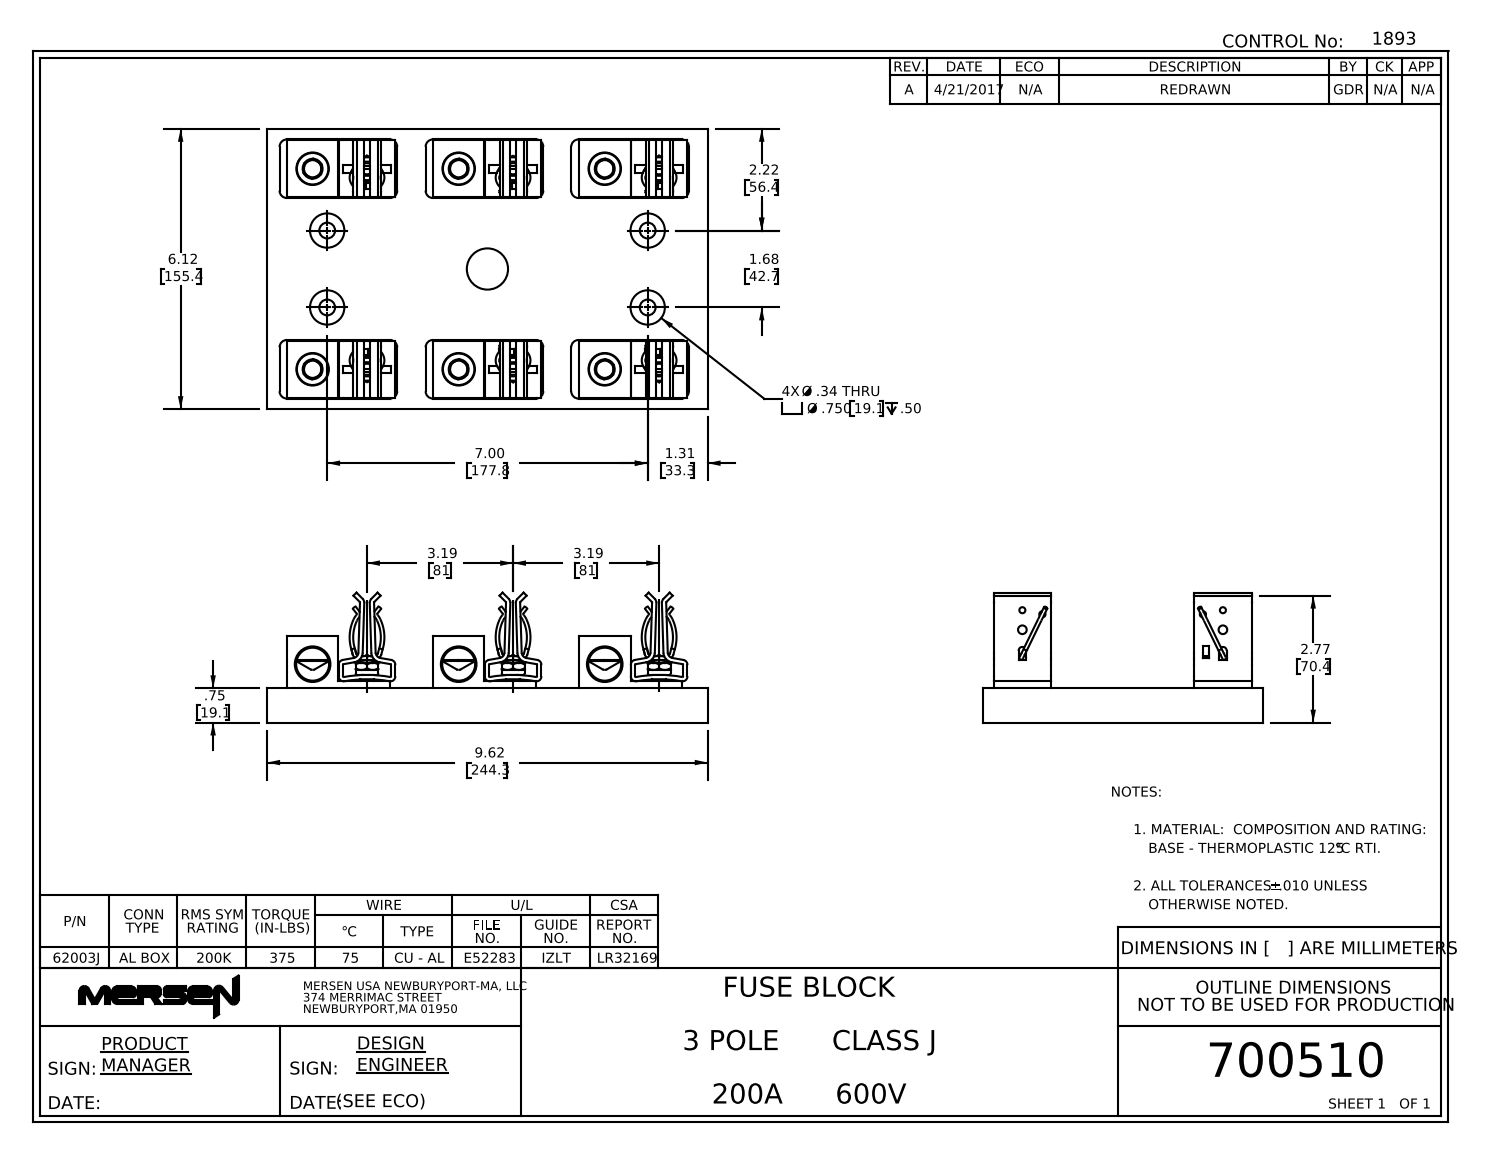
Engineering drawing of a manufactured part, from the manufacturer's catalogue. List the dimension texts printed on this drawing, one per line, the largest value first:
9.62 244.3
7.00 177.8
6.12 155.4
3.19 81
3.19 81
2.77 70.4
2.22 56.4
1.68 42.7
1.31 33.3
.75 19.1
4X Ø .34 THRU Ø .750 19.1 .50
